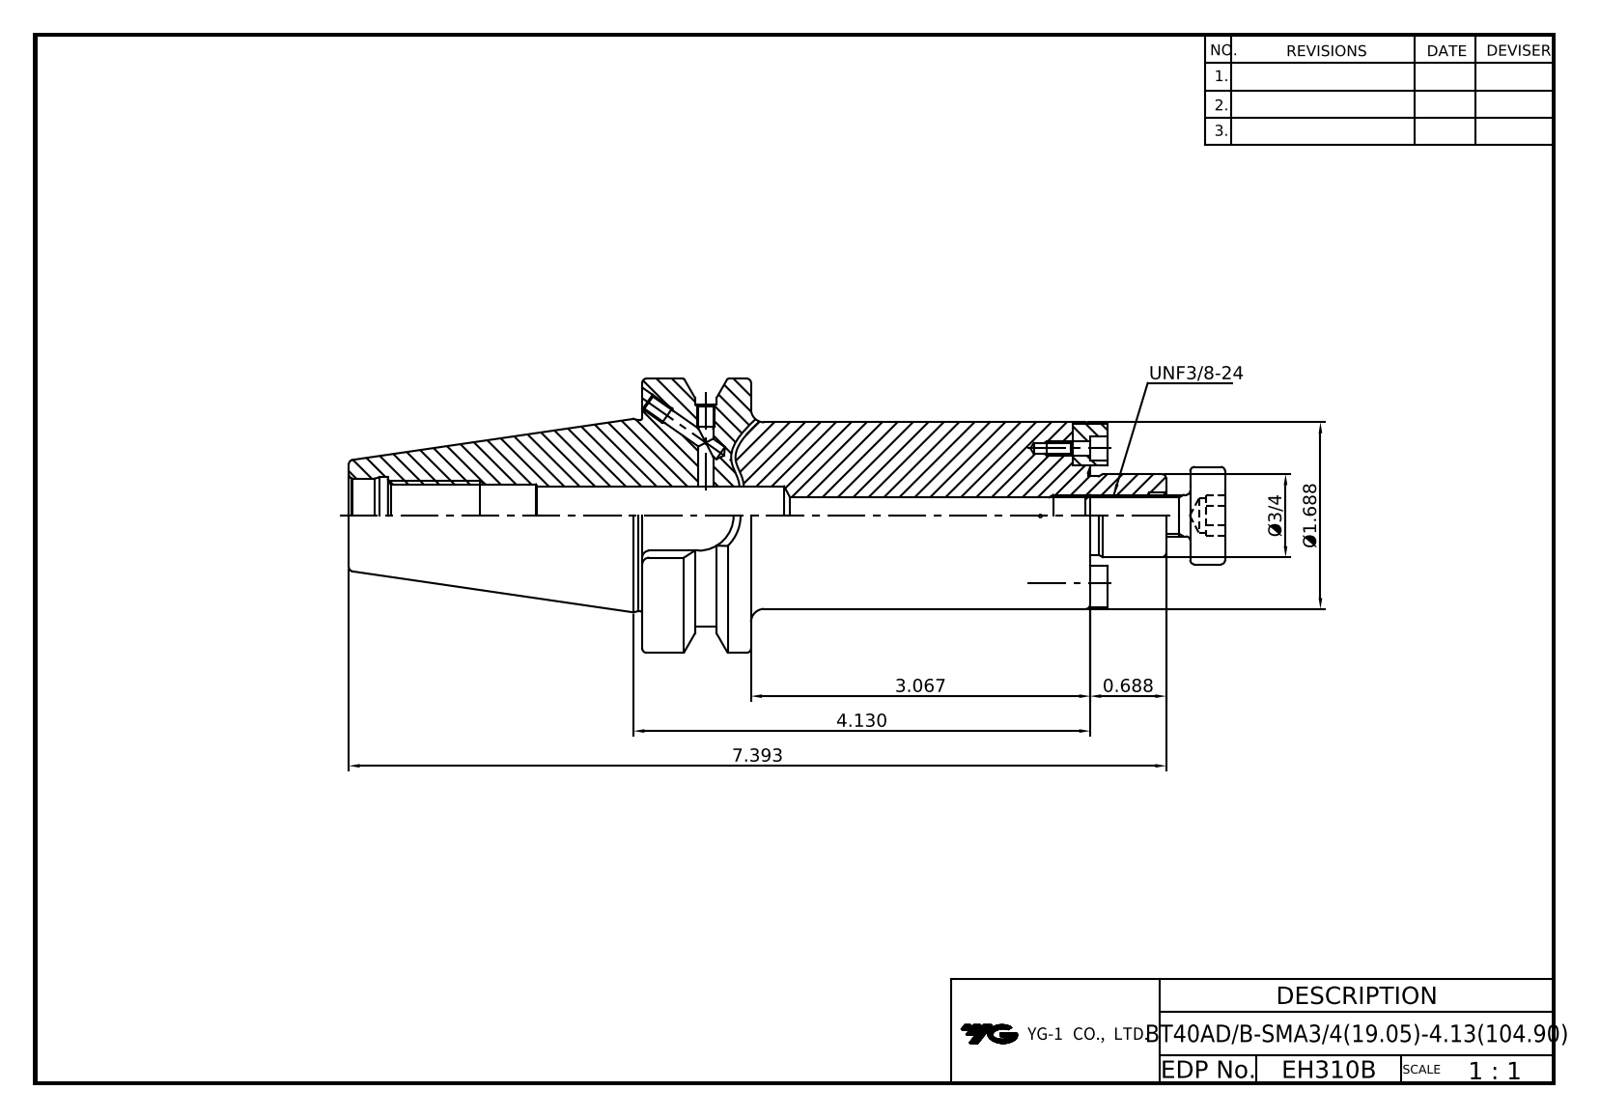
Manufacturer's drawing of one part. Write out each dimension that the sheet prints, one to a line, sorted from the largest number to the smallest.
7.393
4.130
3.067
Ø1.688
Ø3/4
0.688
